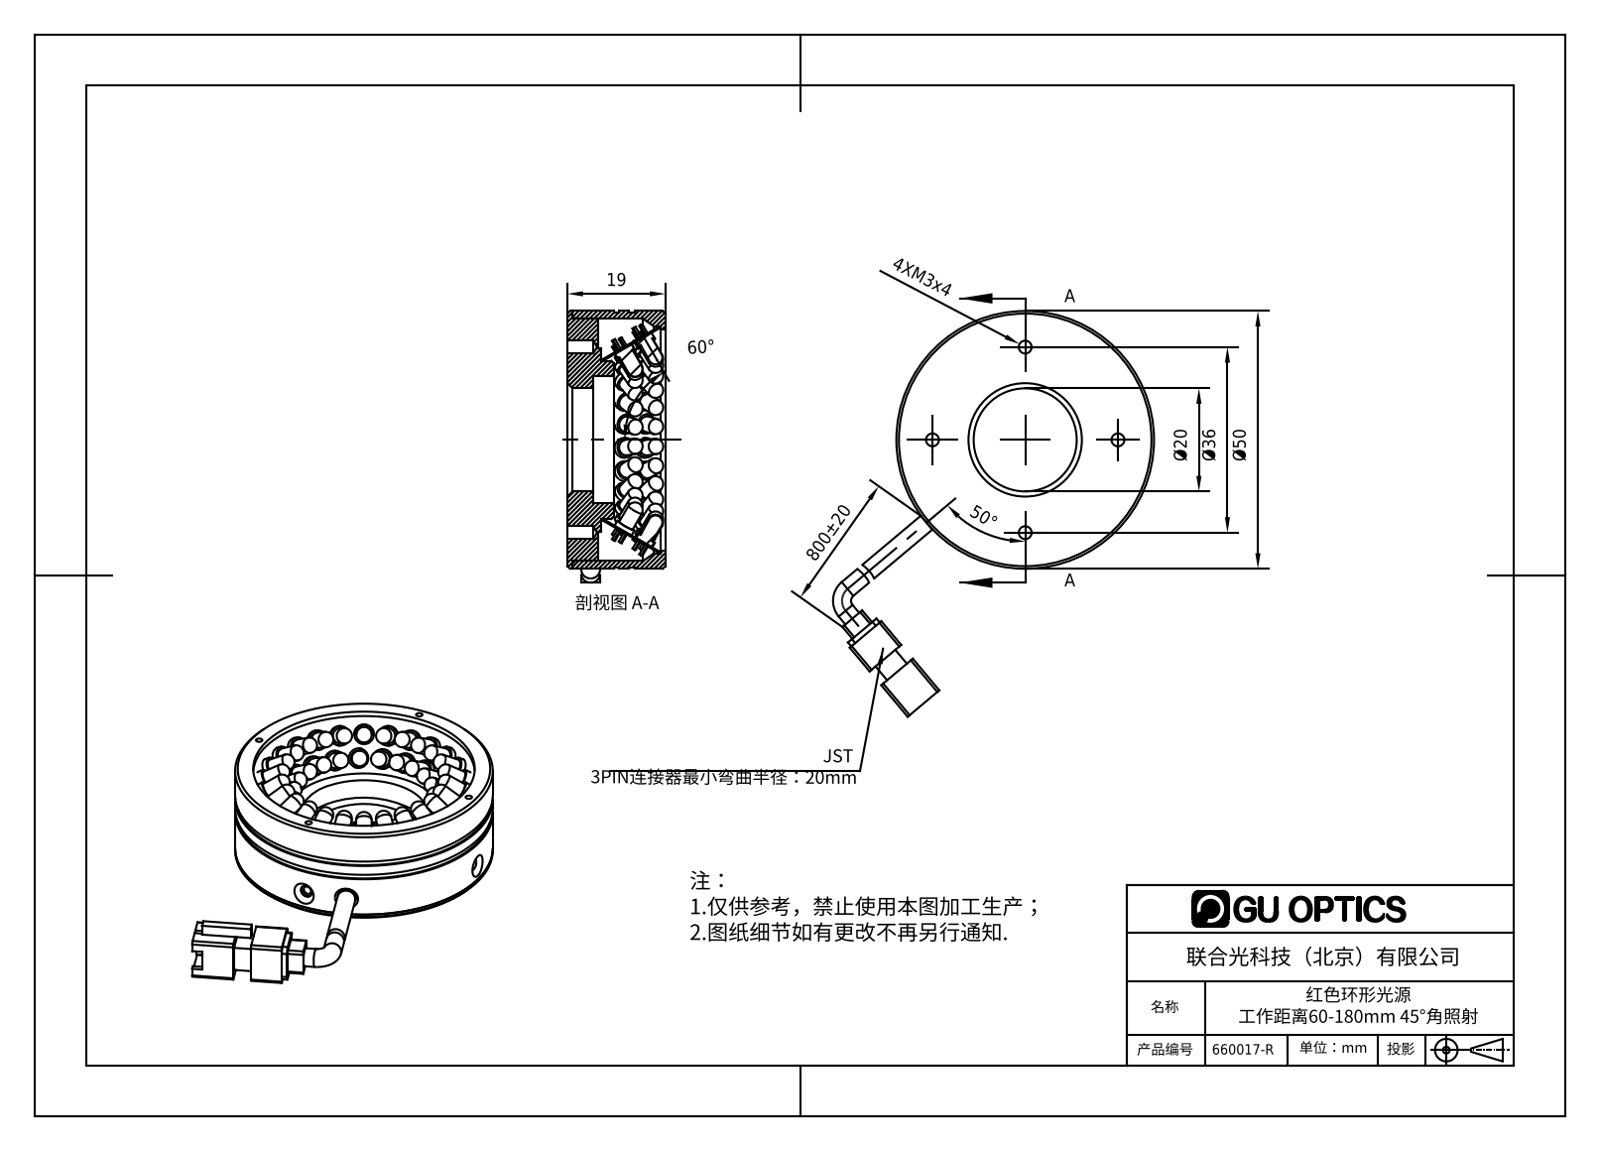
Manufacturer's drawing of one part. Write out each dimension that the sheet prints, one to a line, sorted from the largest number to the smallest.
800±20
60°
50°
Ø50
Ø36
Ø20
19
4XM3x4
